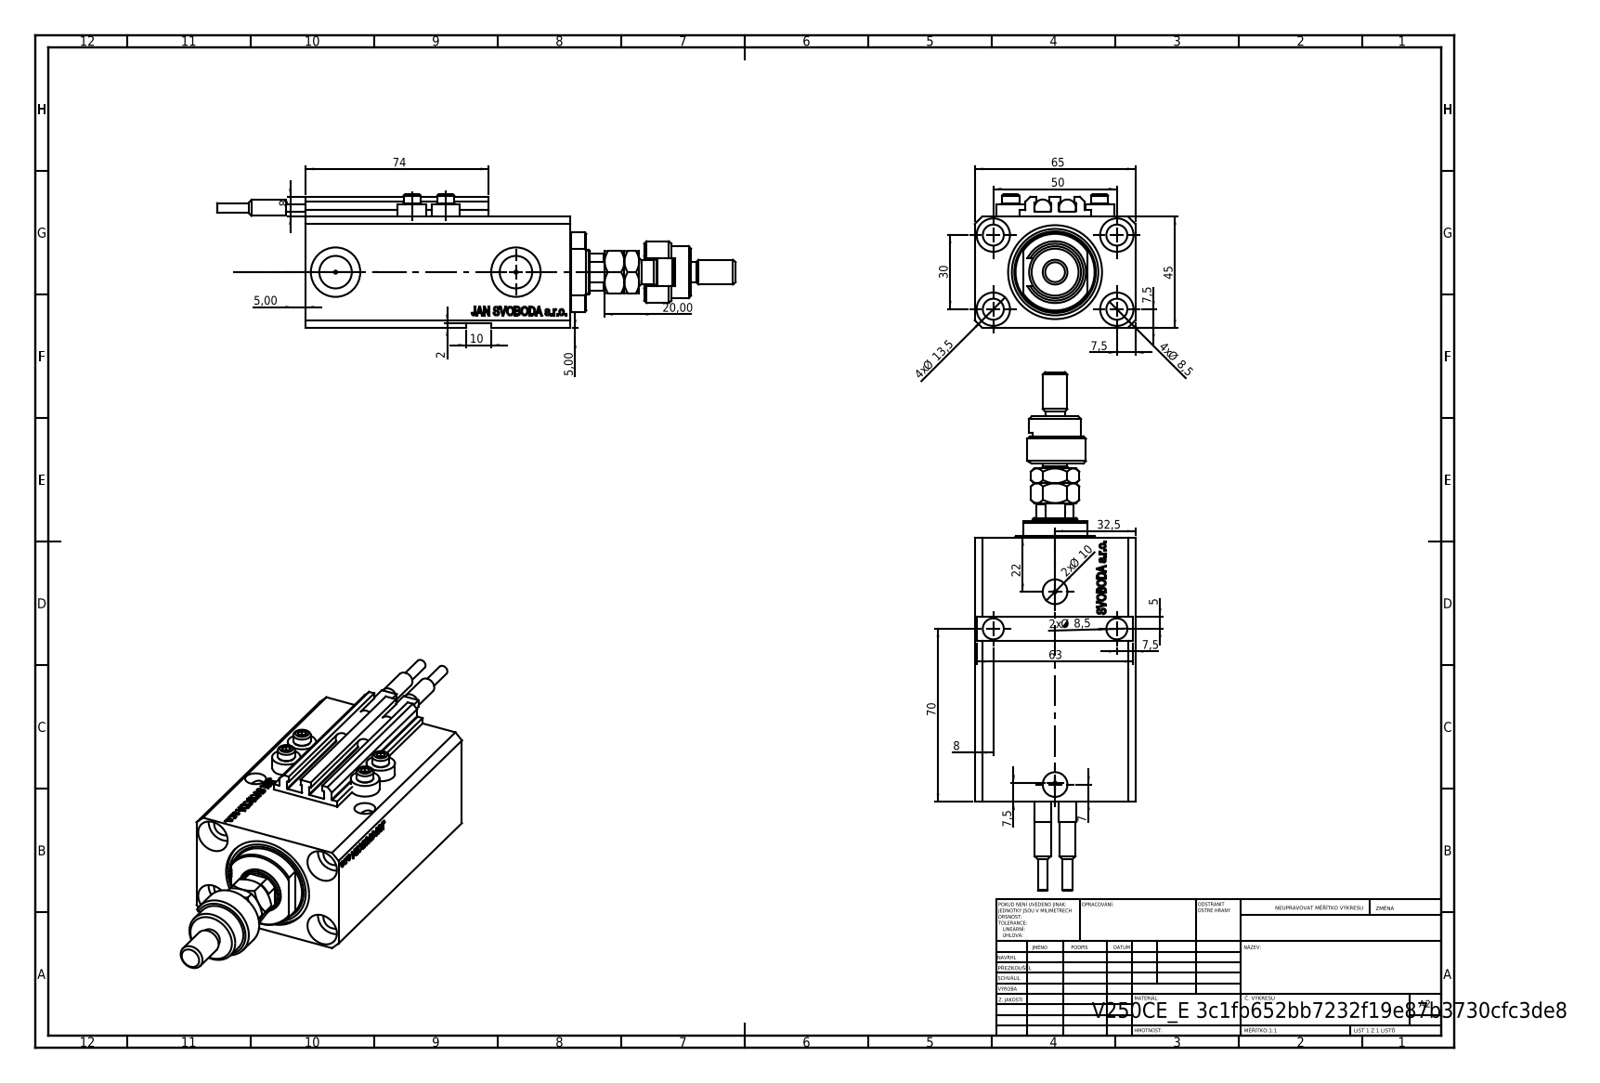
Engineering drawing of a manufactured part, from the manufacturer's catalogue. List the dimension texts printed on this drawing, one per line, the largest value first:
74
70
65
63
50
45
32,5
30
22
20,00
4x Ø 13,5
10
2x Ø 10
4x Ø 8,5
2x Ø 8,5
8
8
7,5
7,5
7,5
7,5
7
5,00
5,00
5
2
